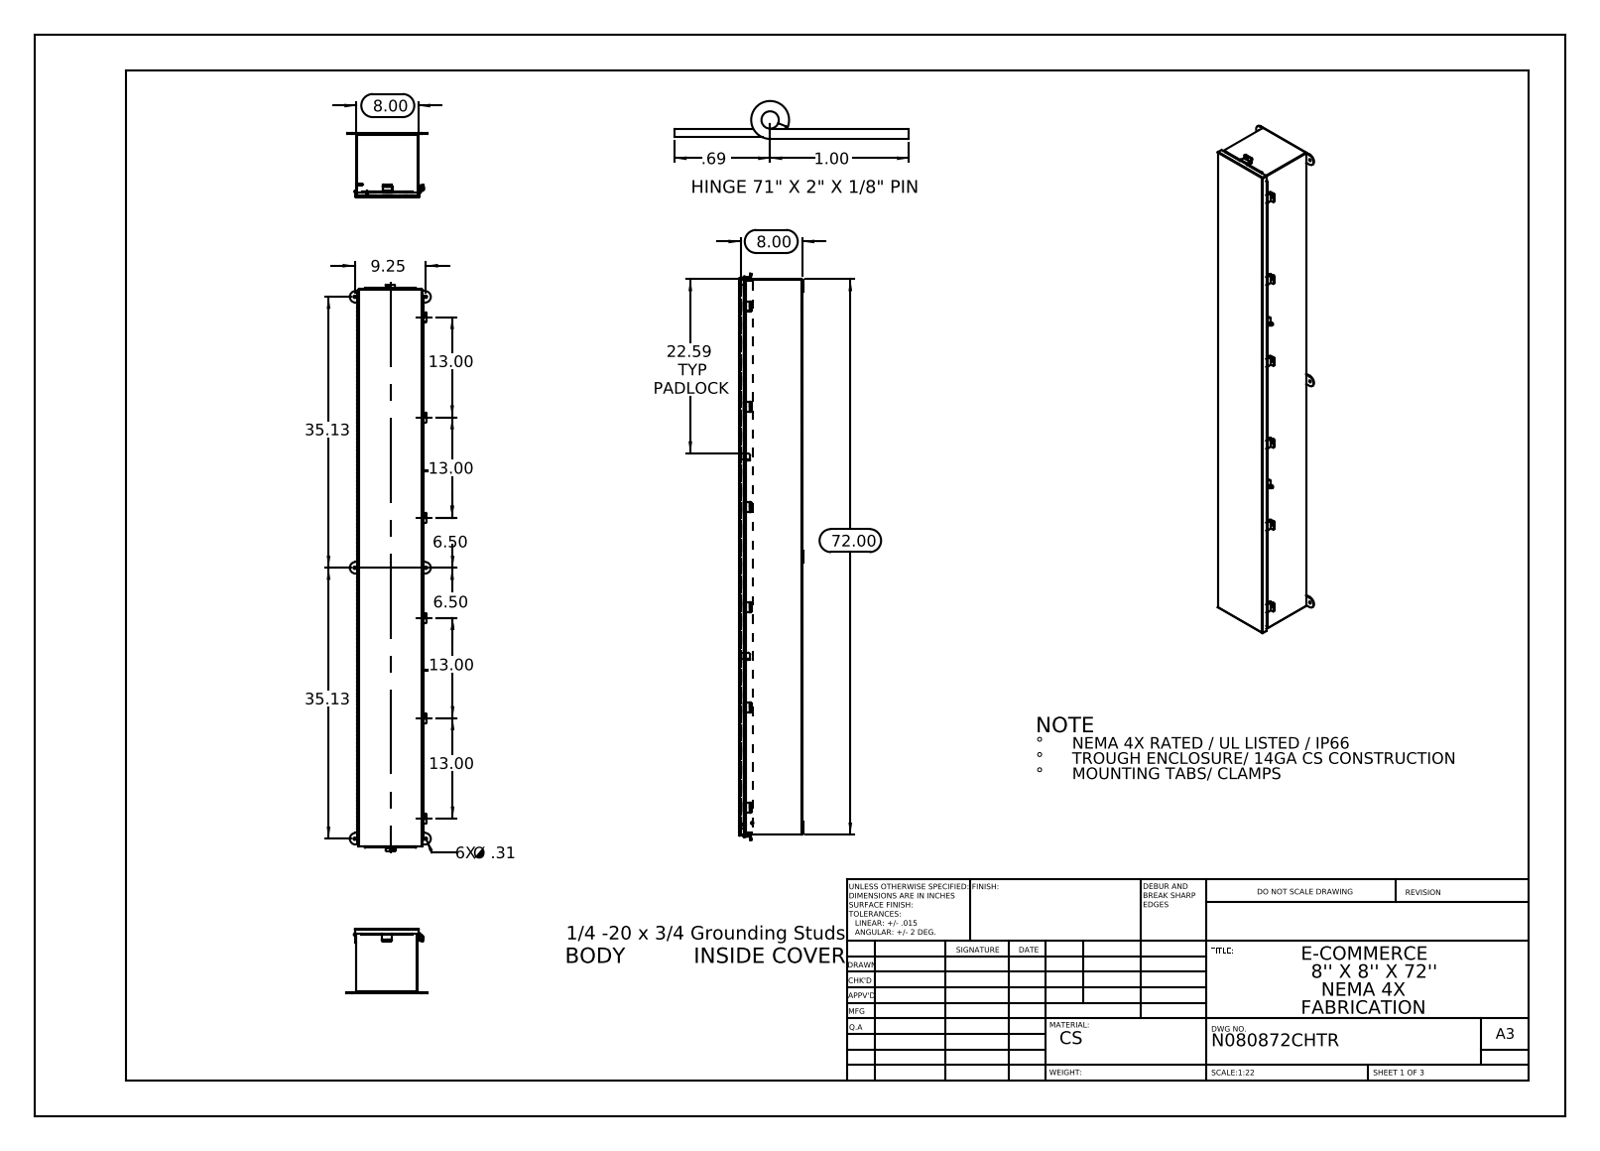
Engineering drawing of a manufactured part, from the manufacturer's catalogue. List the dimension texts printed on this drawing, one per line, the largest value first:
72.00
35.13
35.13
22.59 TYP PADLOCK
13.00
13.00
13.00
13.00
9.25
8.00
8.00
6.50
6.50
1.00
.69
6X Ø .31
